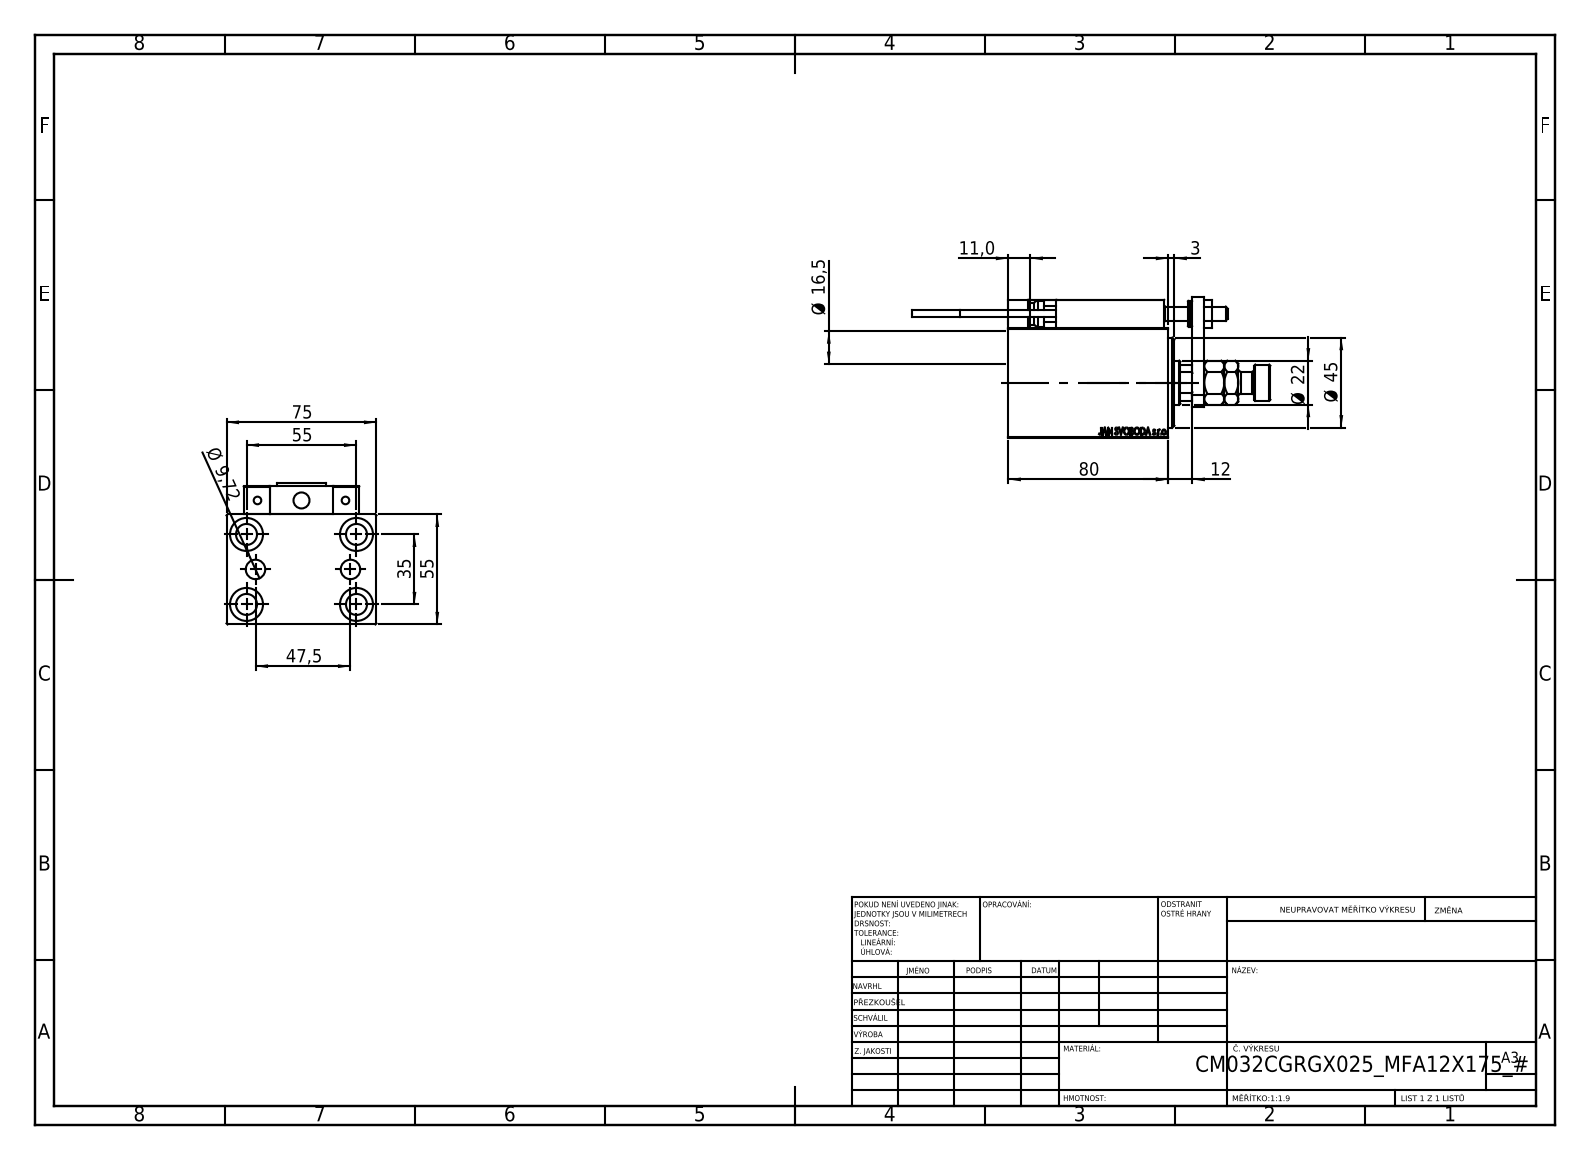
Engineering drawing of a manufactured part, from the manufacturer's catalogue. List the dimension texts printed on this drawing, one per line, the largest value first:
80
75
55
55
47,5
Ø 45
35
Ø 22
Ø 16,5
12
11,0
Ø 9,72
3
